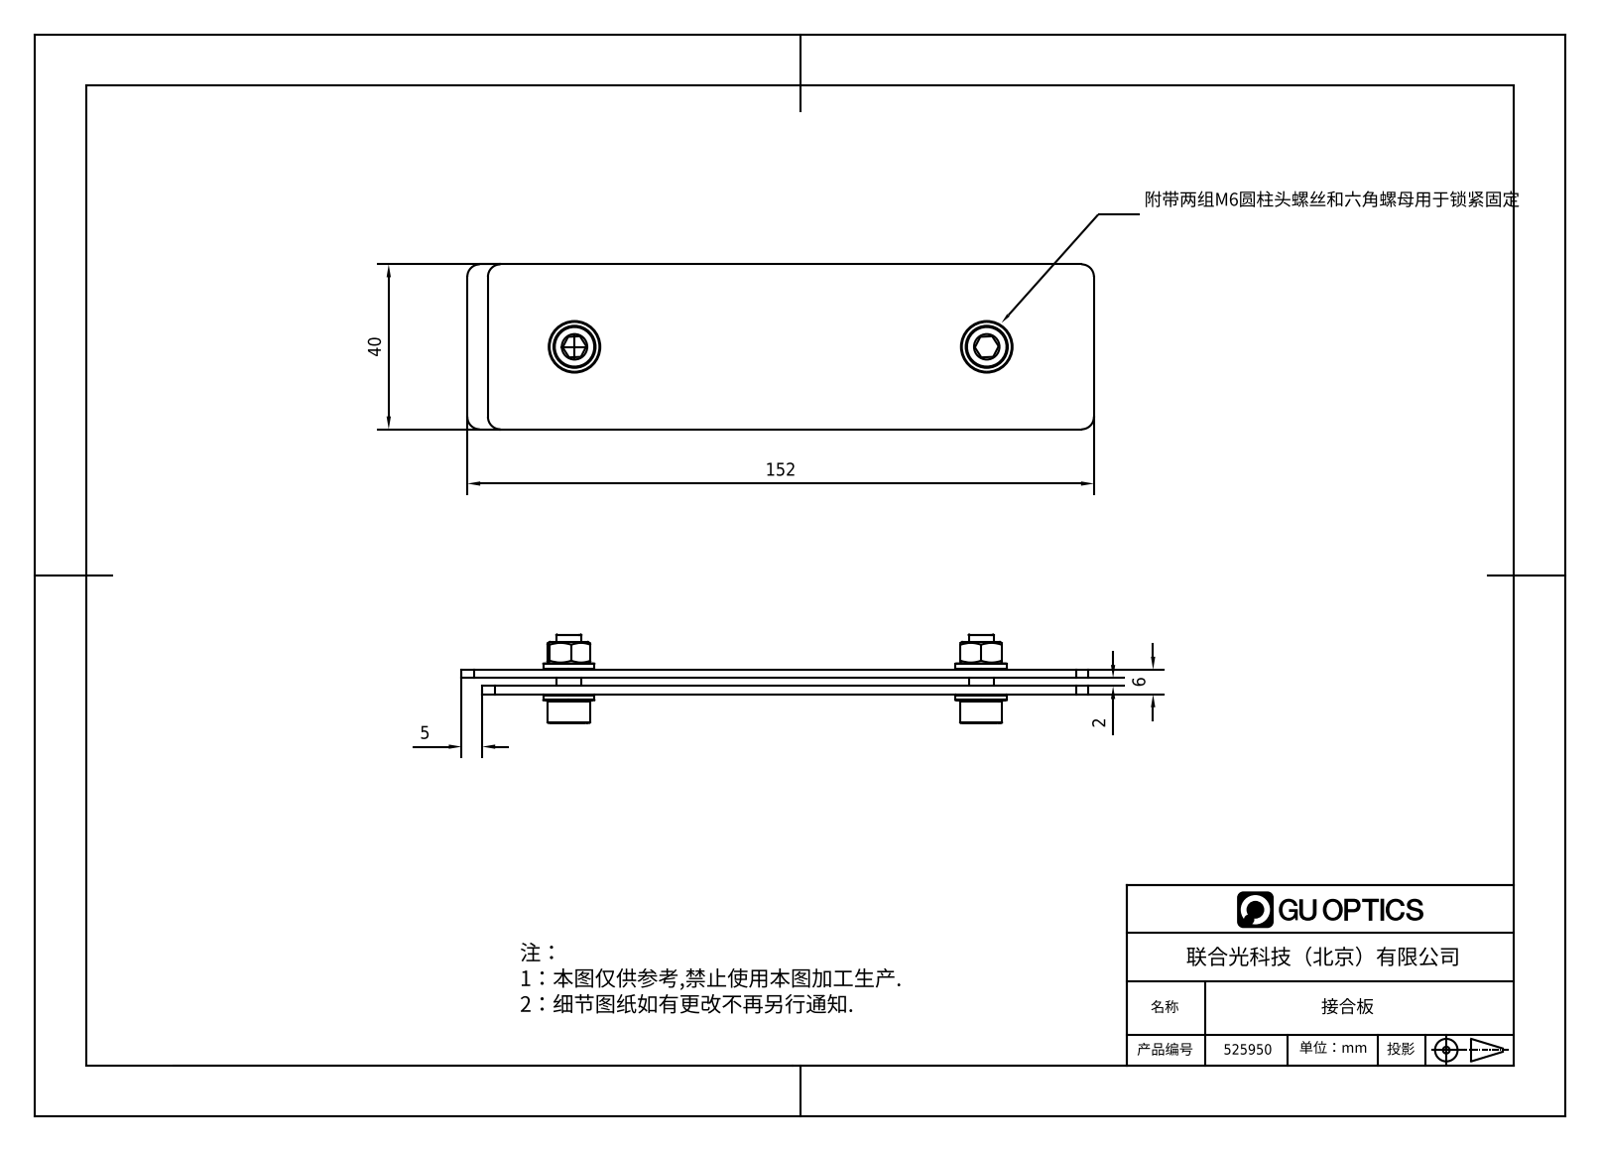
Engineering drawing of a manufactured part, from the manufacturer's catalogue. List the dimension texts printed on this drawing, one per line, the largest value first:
152
40
6
5
2
